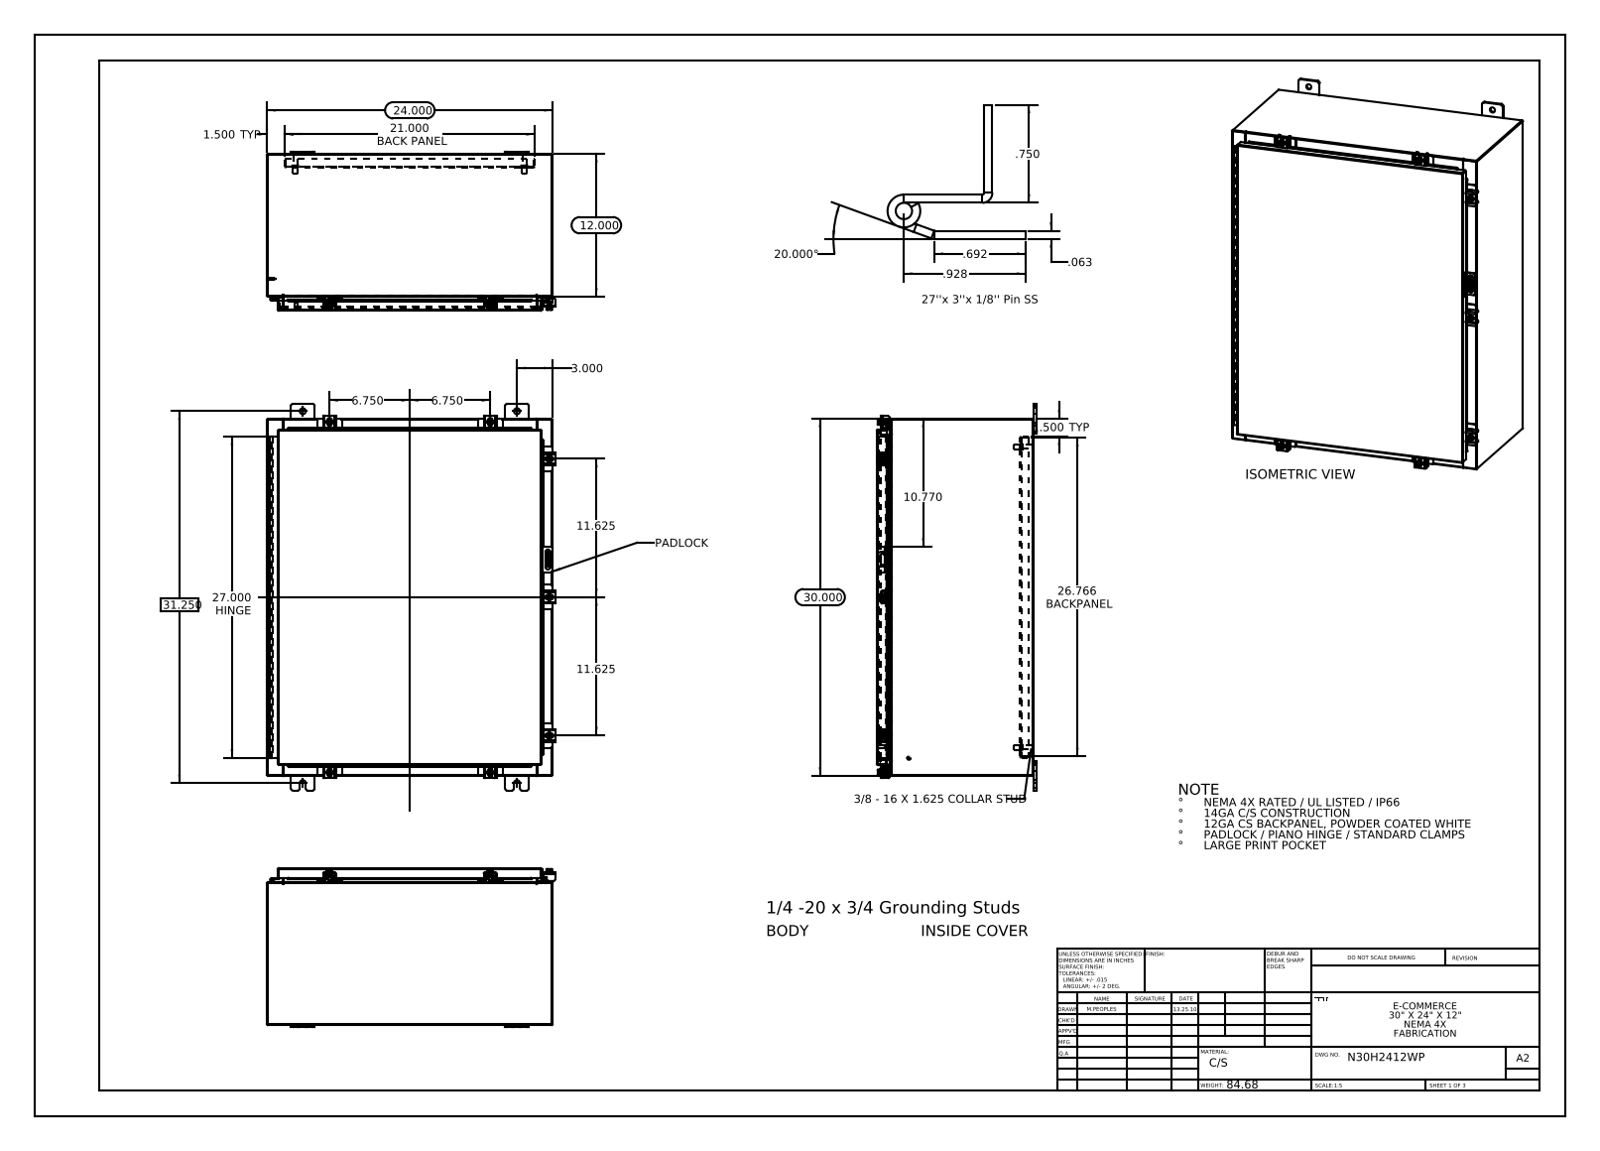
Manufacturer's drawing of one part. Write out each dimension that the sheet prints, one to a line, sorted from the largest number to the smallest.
31.250
30.000
27.000 HINGE
26.766 BACKPANEL
24.000
21.000 BACK PANEL
20.000°
12.000
11.625
11.625
10.770
6.750
6.750
3.000
1.500 TYP
1.500 TYP
.928
.750
.692
.063
